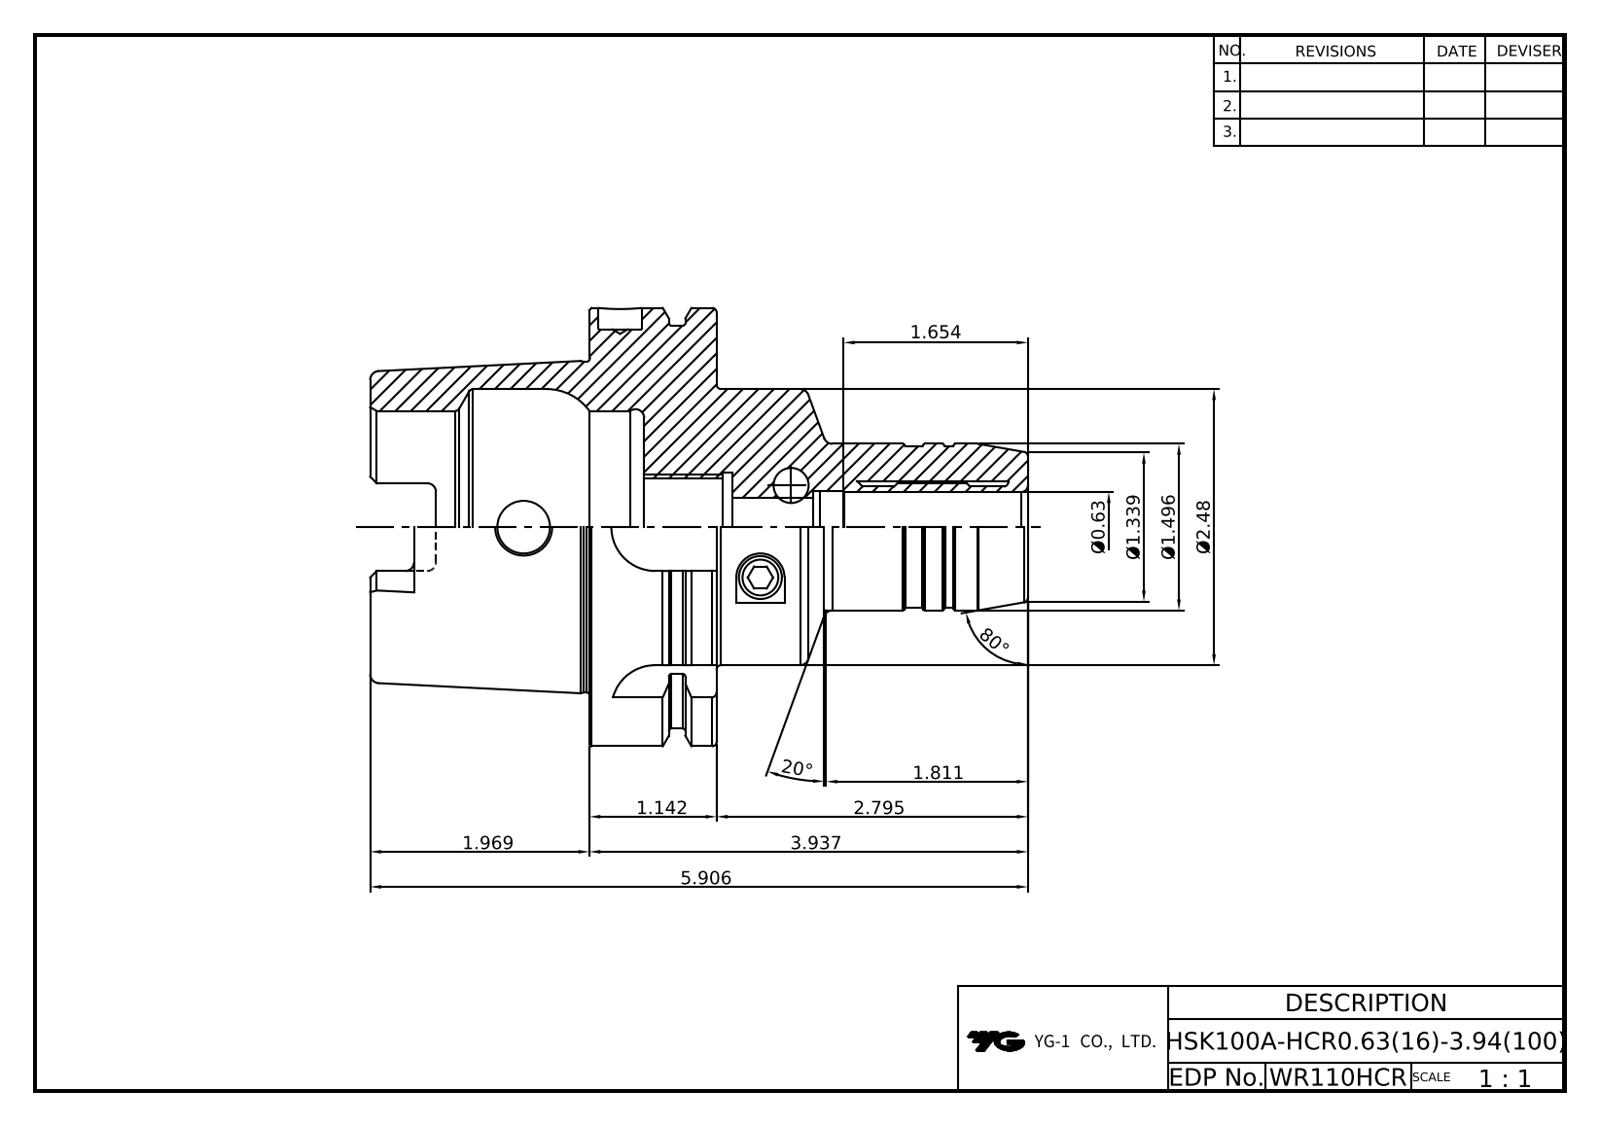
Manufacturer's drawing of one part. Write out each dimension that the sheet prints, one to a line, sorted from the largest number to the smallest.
80°
20°
5.906
3.937
2.795
Ø2.48
1.969
1.811
1.654
Ø1.496
Ø1.339
1.142
Ø0.63
